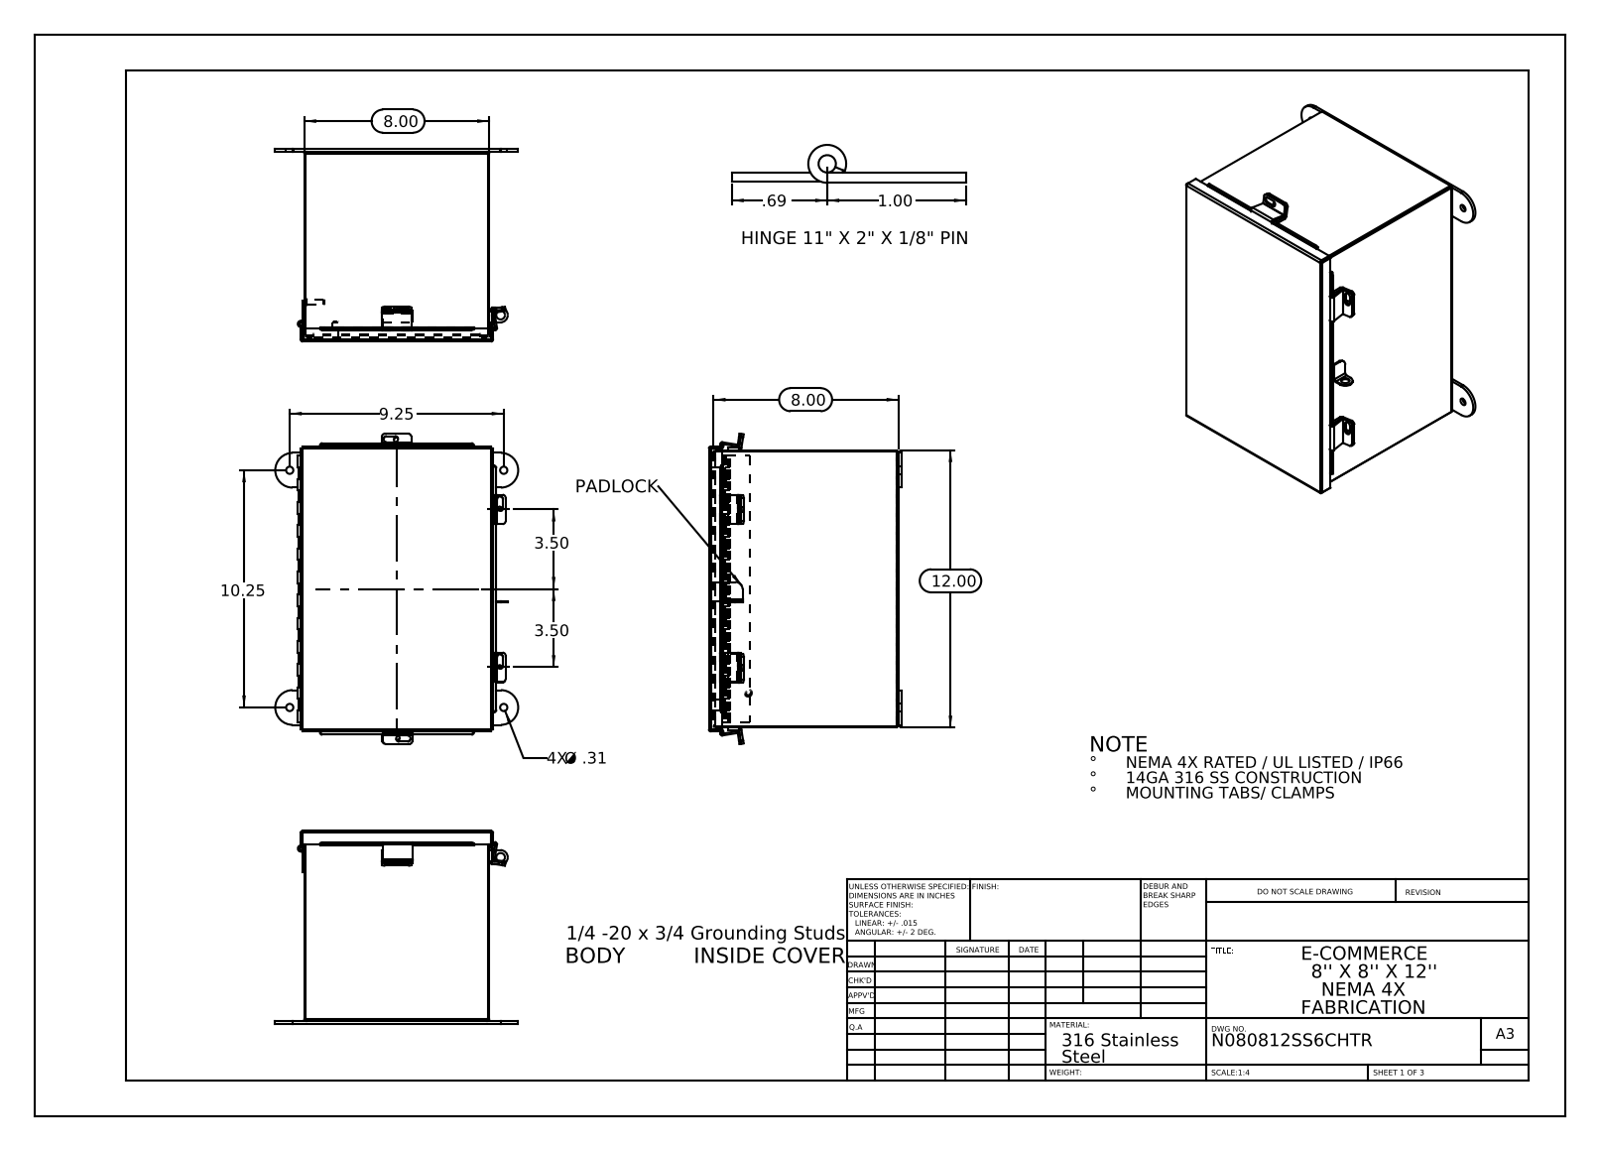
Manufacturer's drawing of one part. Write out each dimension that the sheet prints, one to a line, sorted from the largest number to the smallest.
12.00
10.25
9.25
8.00
8.00
3.50
3.50
1.00
.69
4X Ø .31
